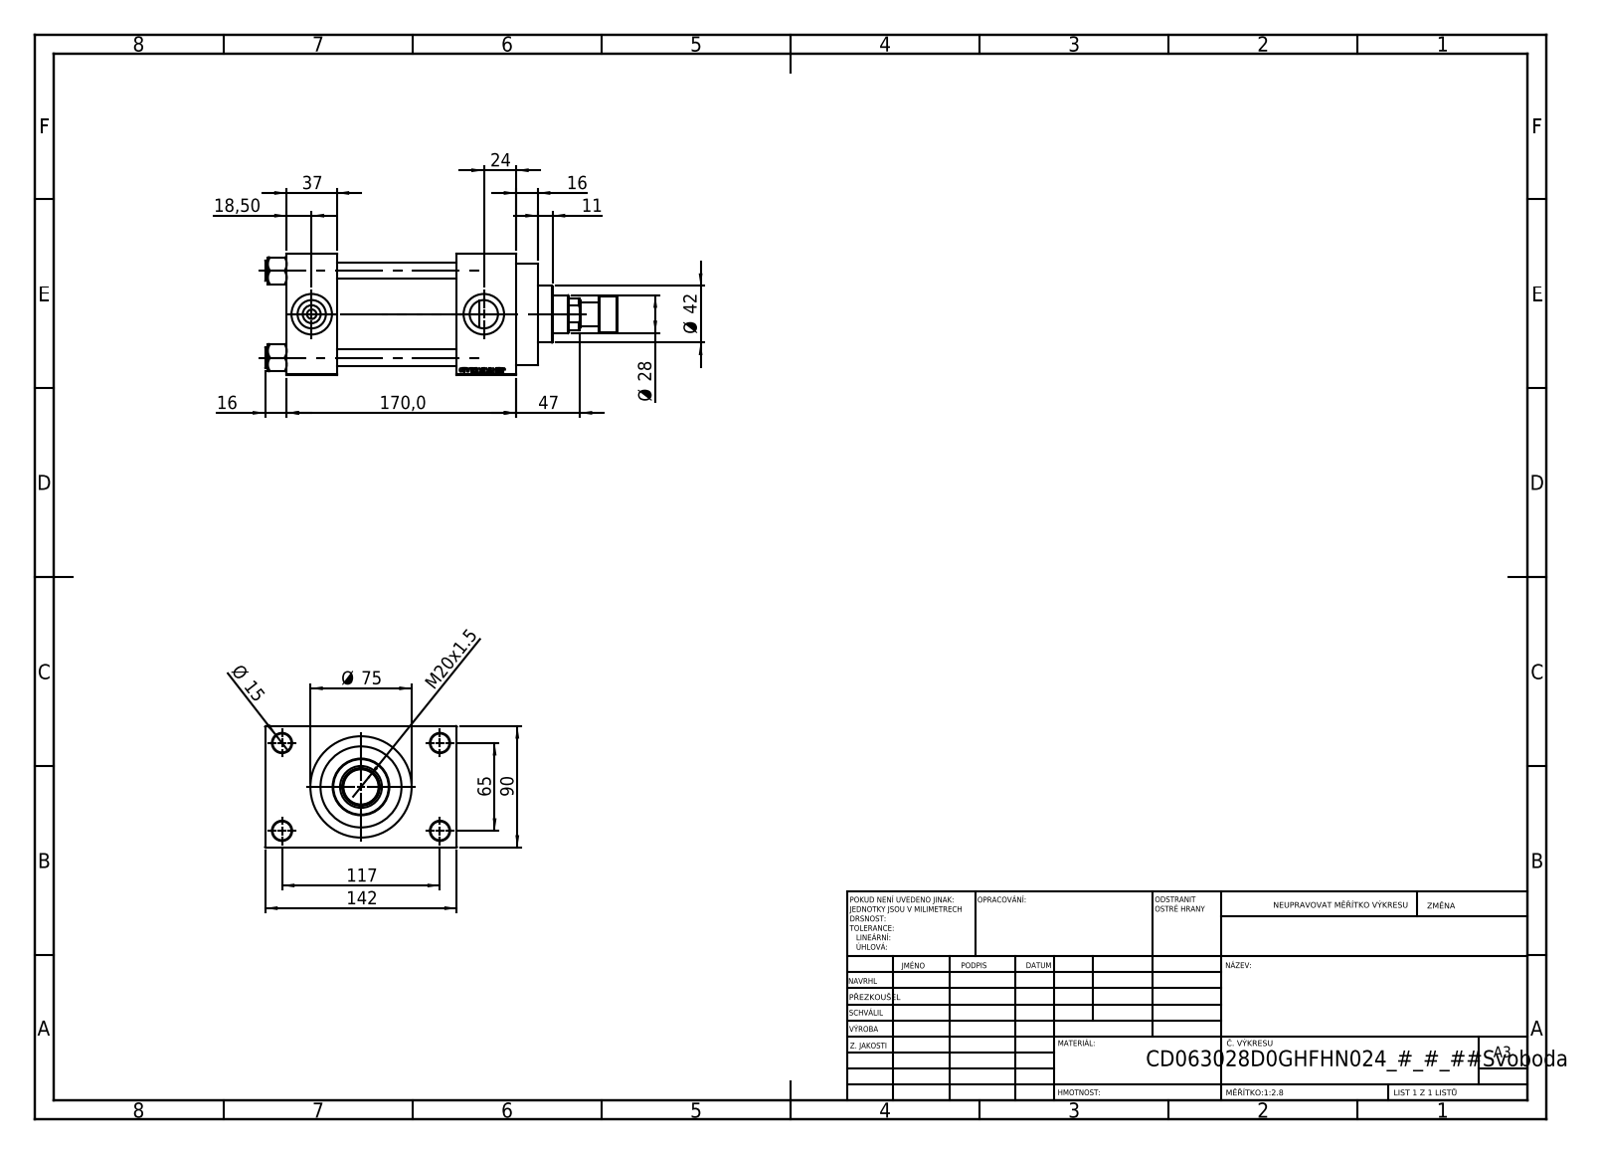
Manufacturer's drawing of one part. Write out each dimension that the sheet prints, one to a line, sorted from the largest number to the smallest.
170,0
142
117
90
Ø 75
65
47
Ø 42
37
Ø 28
24
M20x1.5
18,50
16
16
Ø 15
11
